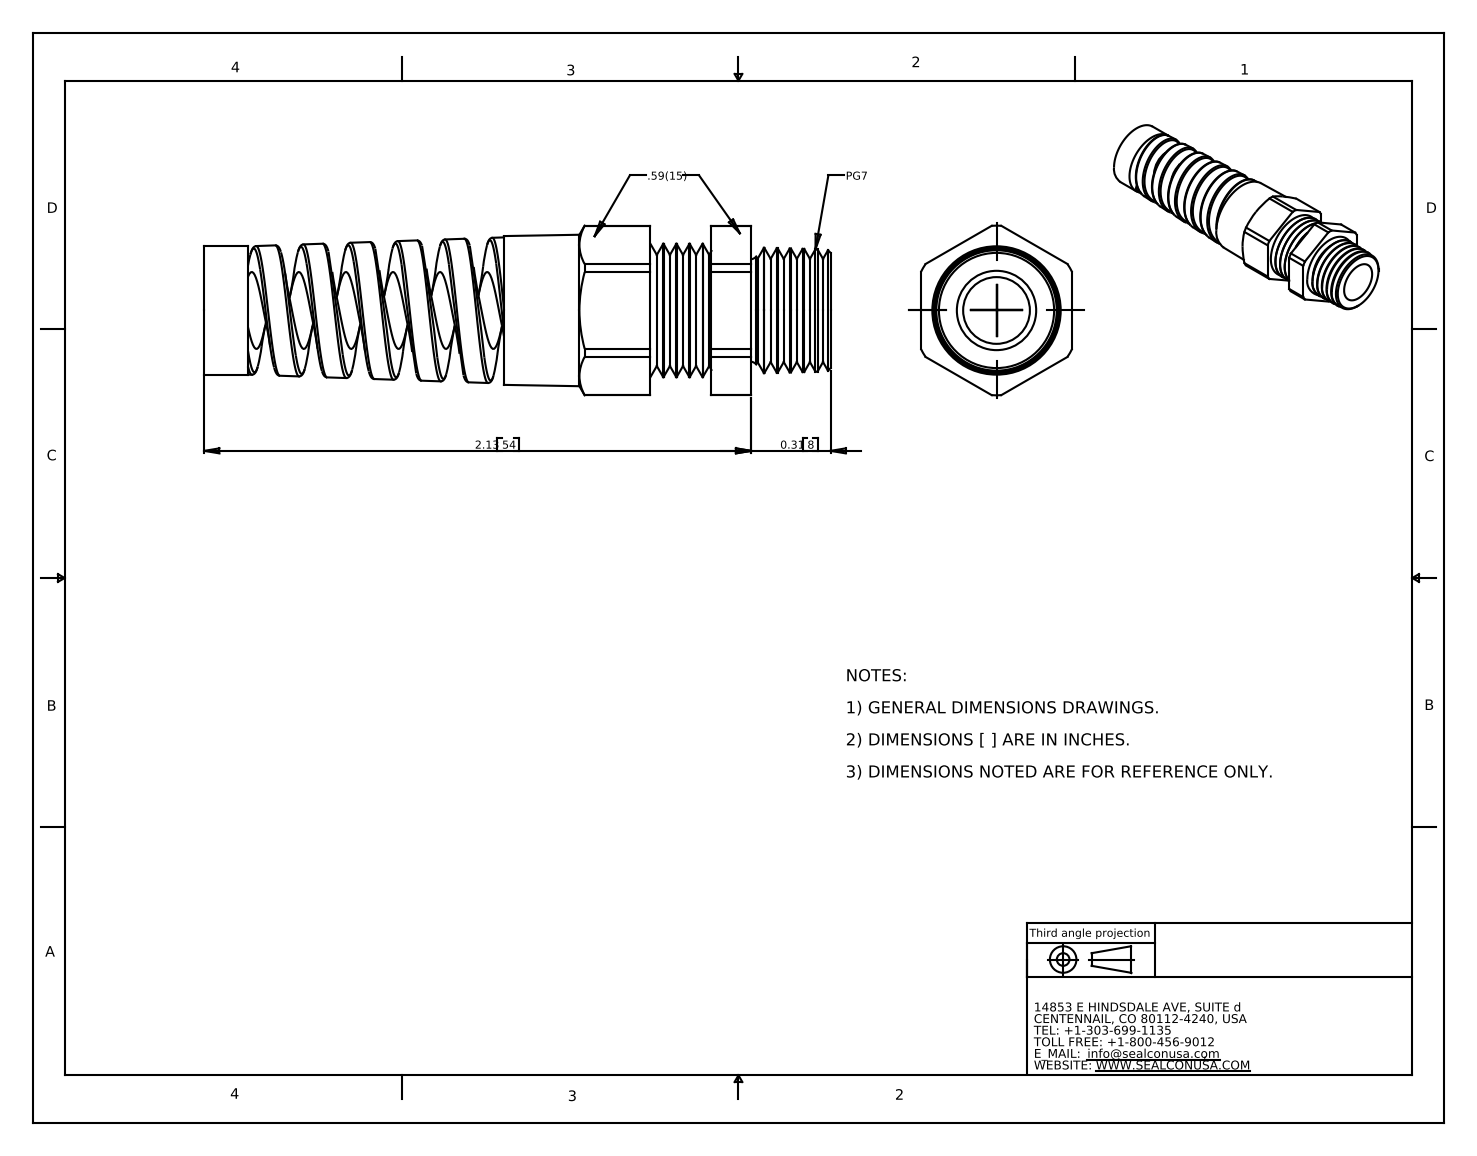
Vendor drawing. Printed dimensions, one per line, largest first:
2.13 54
0.31 8
